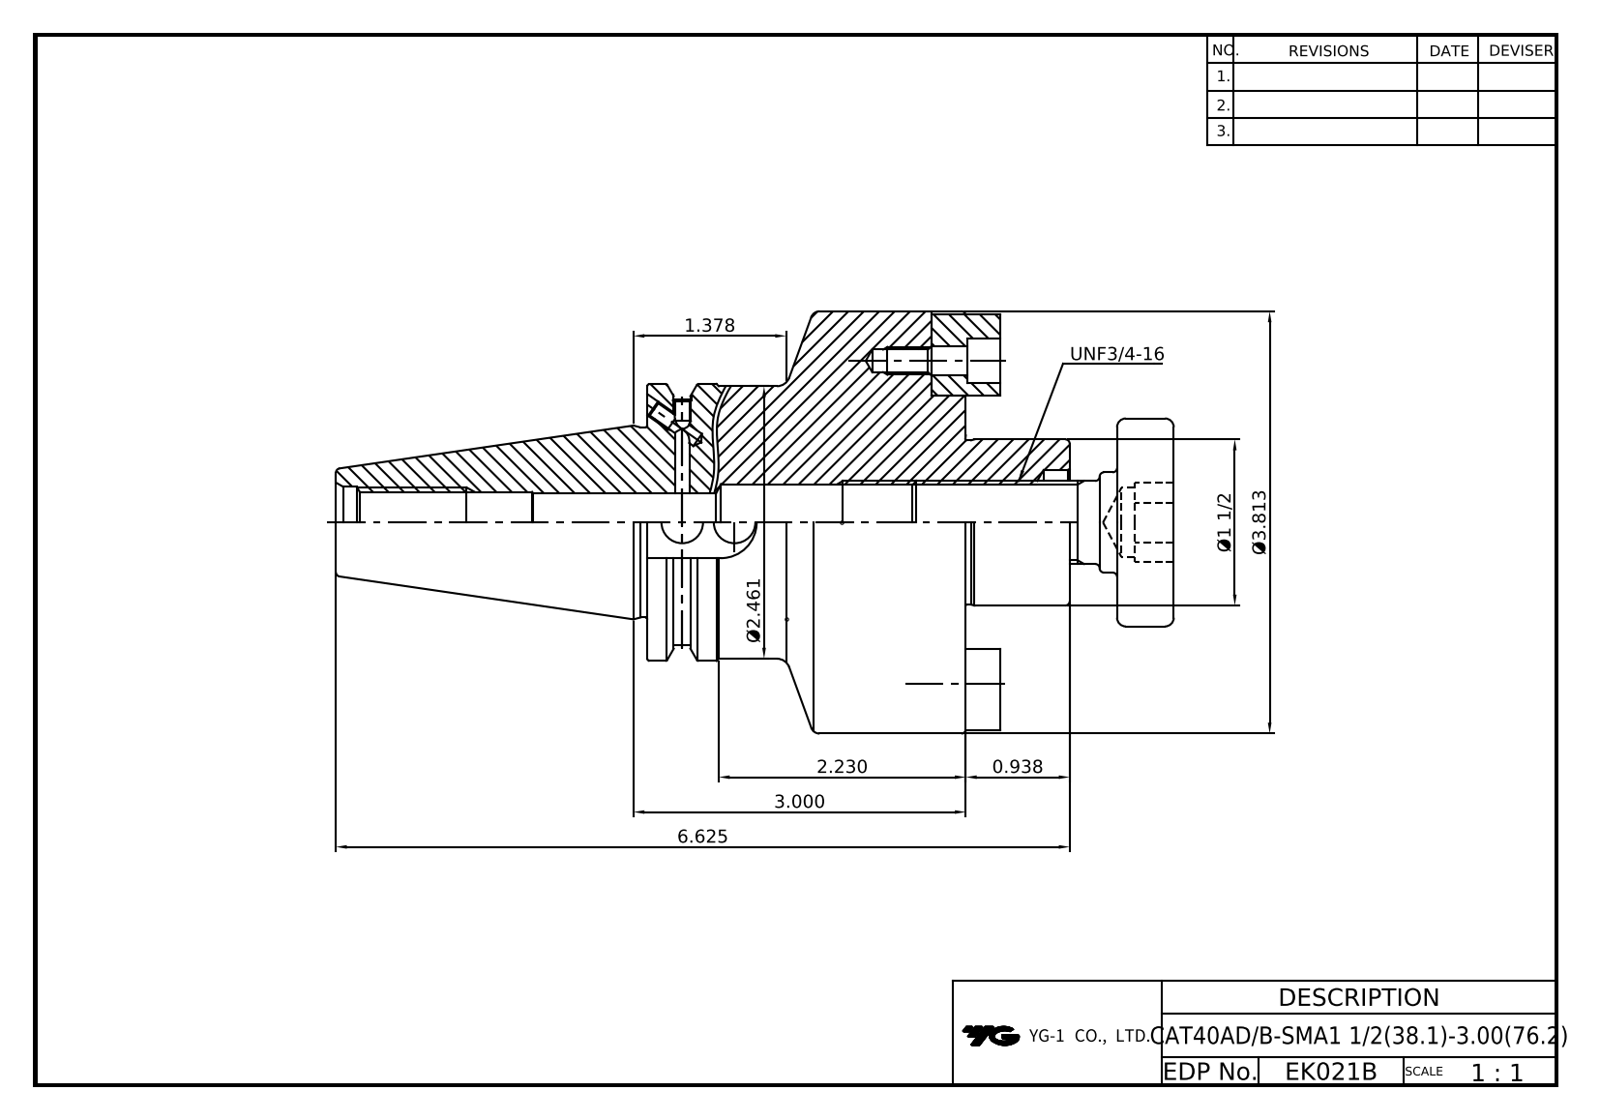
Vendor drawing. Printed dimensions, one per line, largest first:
6.625
Ø3.813
3.000
Ø2.461
2.230
Ø1 1/2
1.378
0.938
